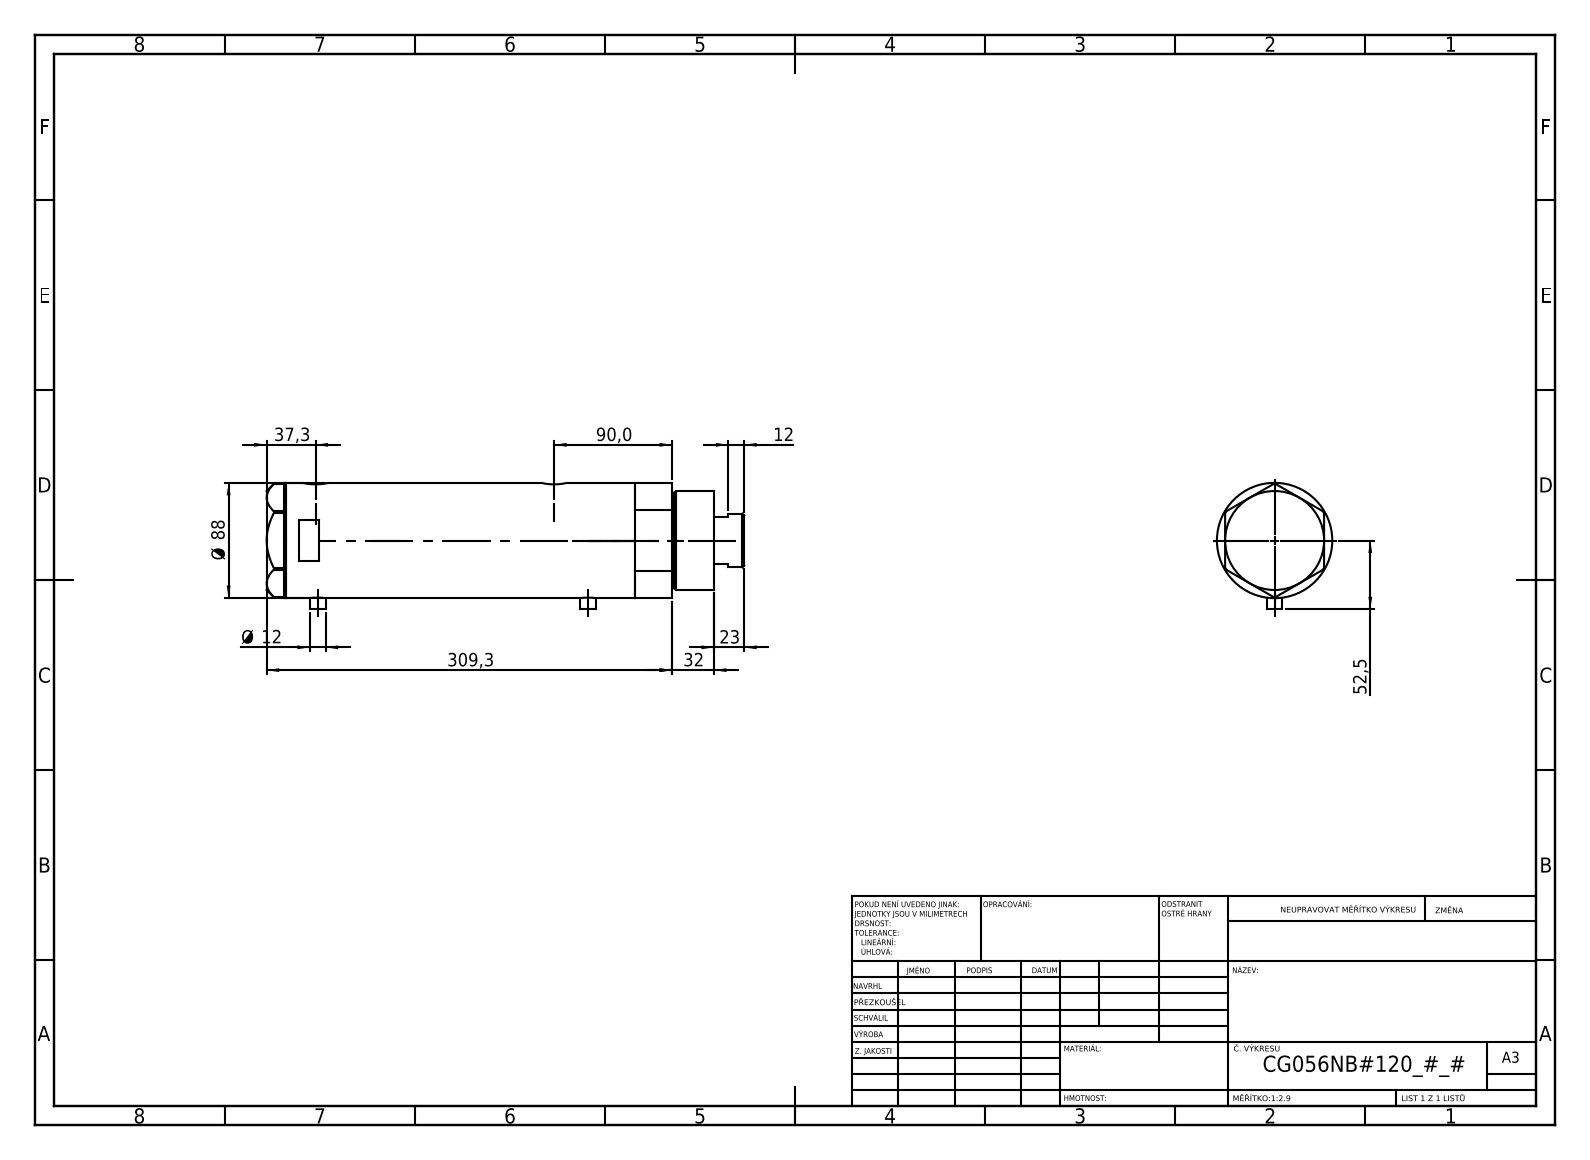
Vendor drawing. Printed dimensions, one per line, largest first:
309,3
90,0
Ø 88
52,5
37,3
32
23
12
Ø 12
